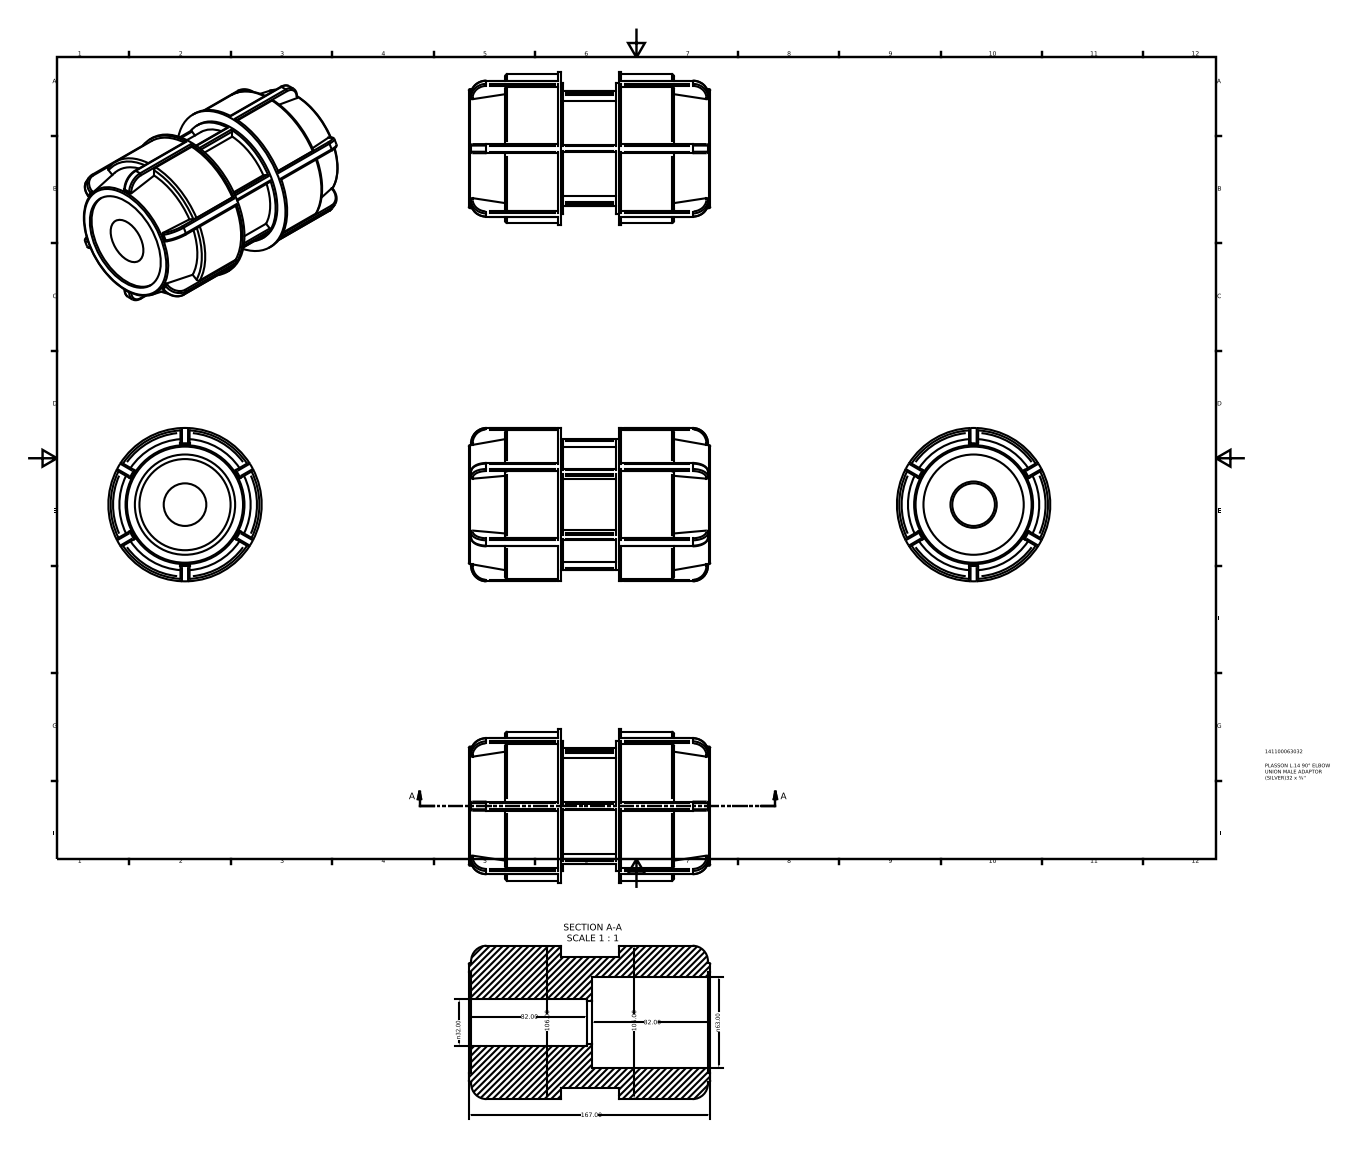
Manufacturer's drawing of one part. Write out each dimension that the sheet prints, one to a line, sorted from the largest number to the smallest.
167.00
106.00
106.00
82.00
82.00
n63.00
n32.00
